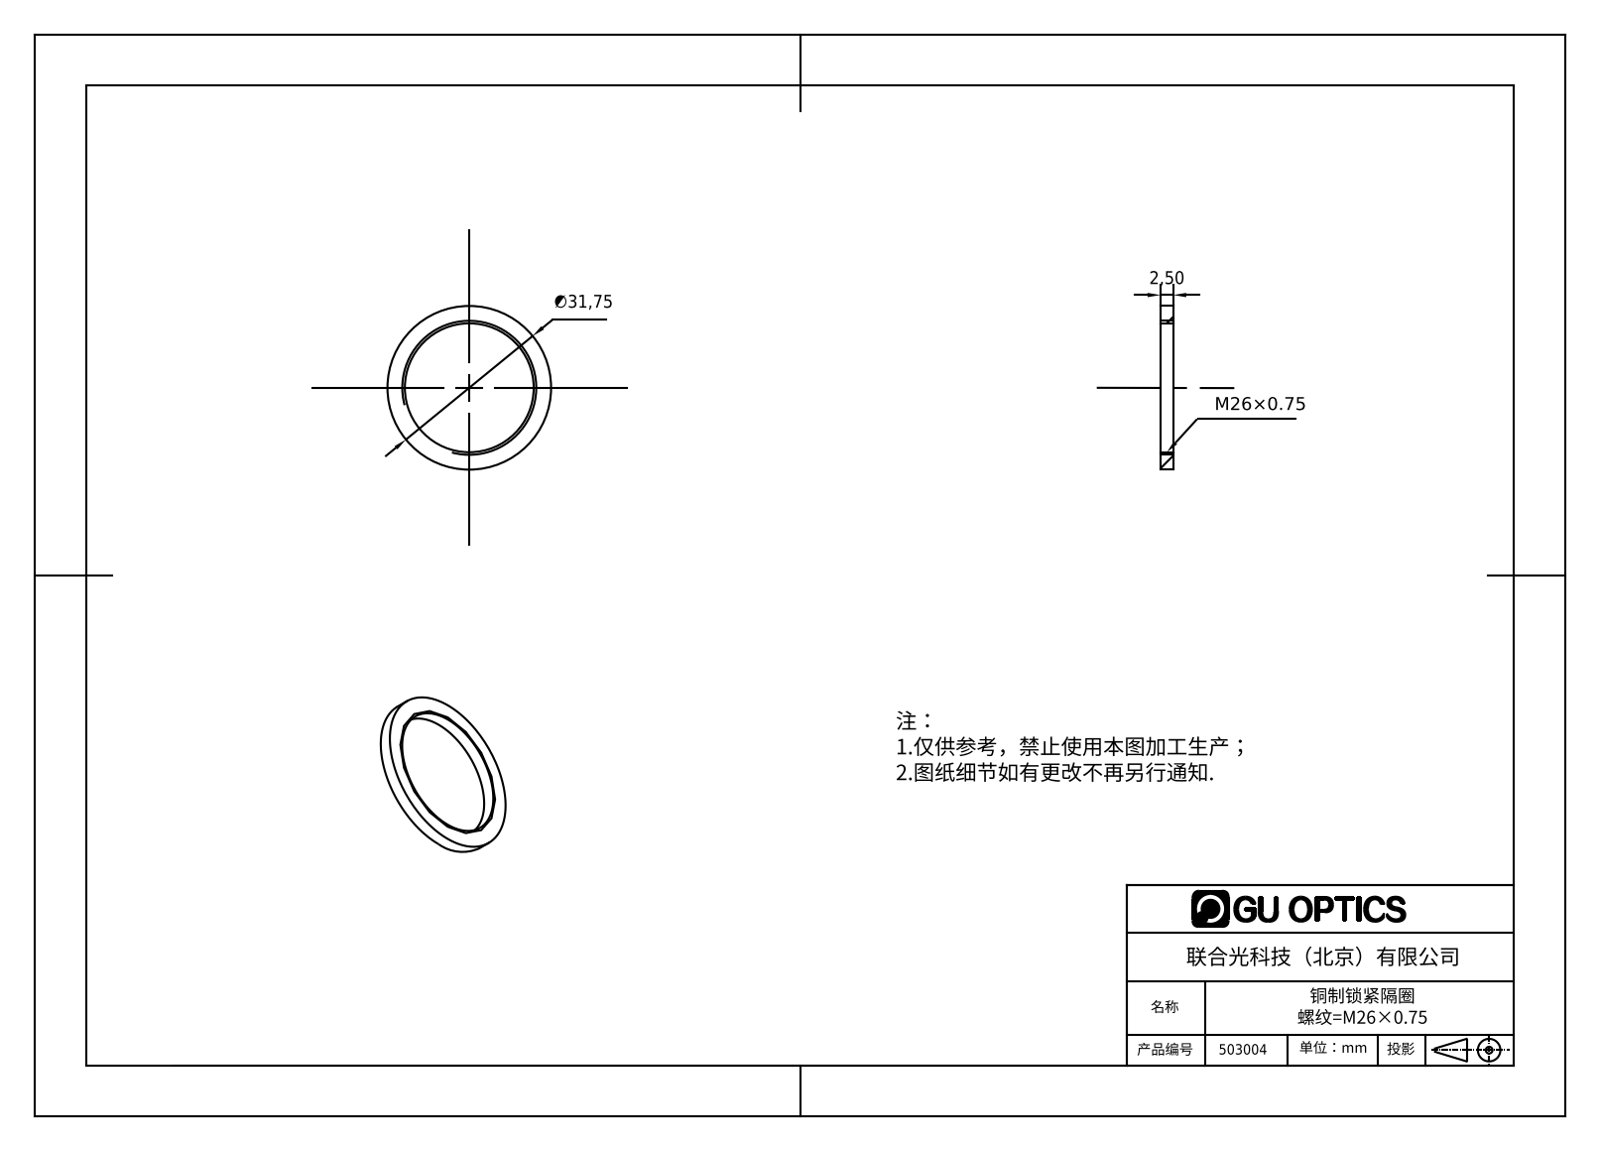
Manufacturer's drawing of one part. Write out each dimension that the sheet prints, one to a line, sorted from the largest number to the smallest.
∅31,75
2,50
